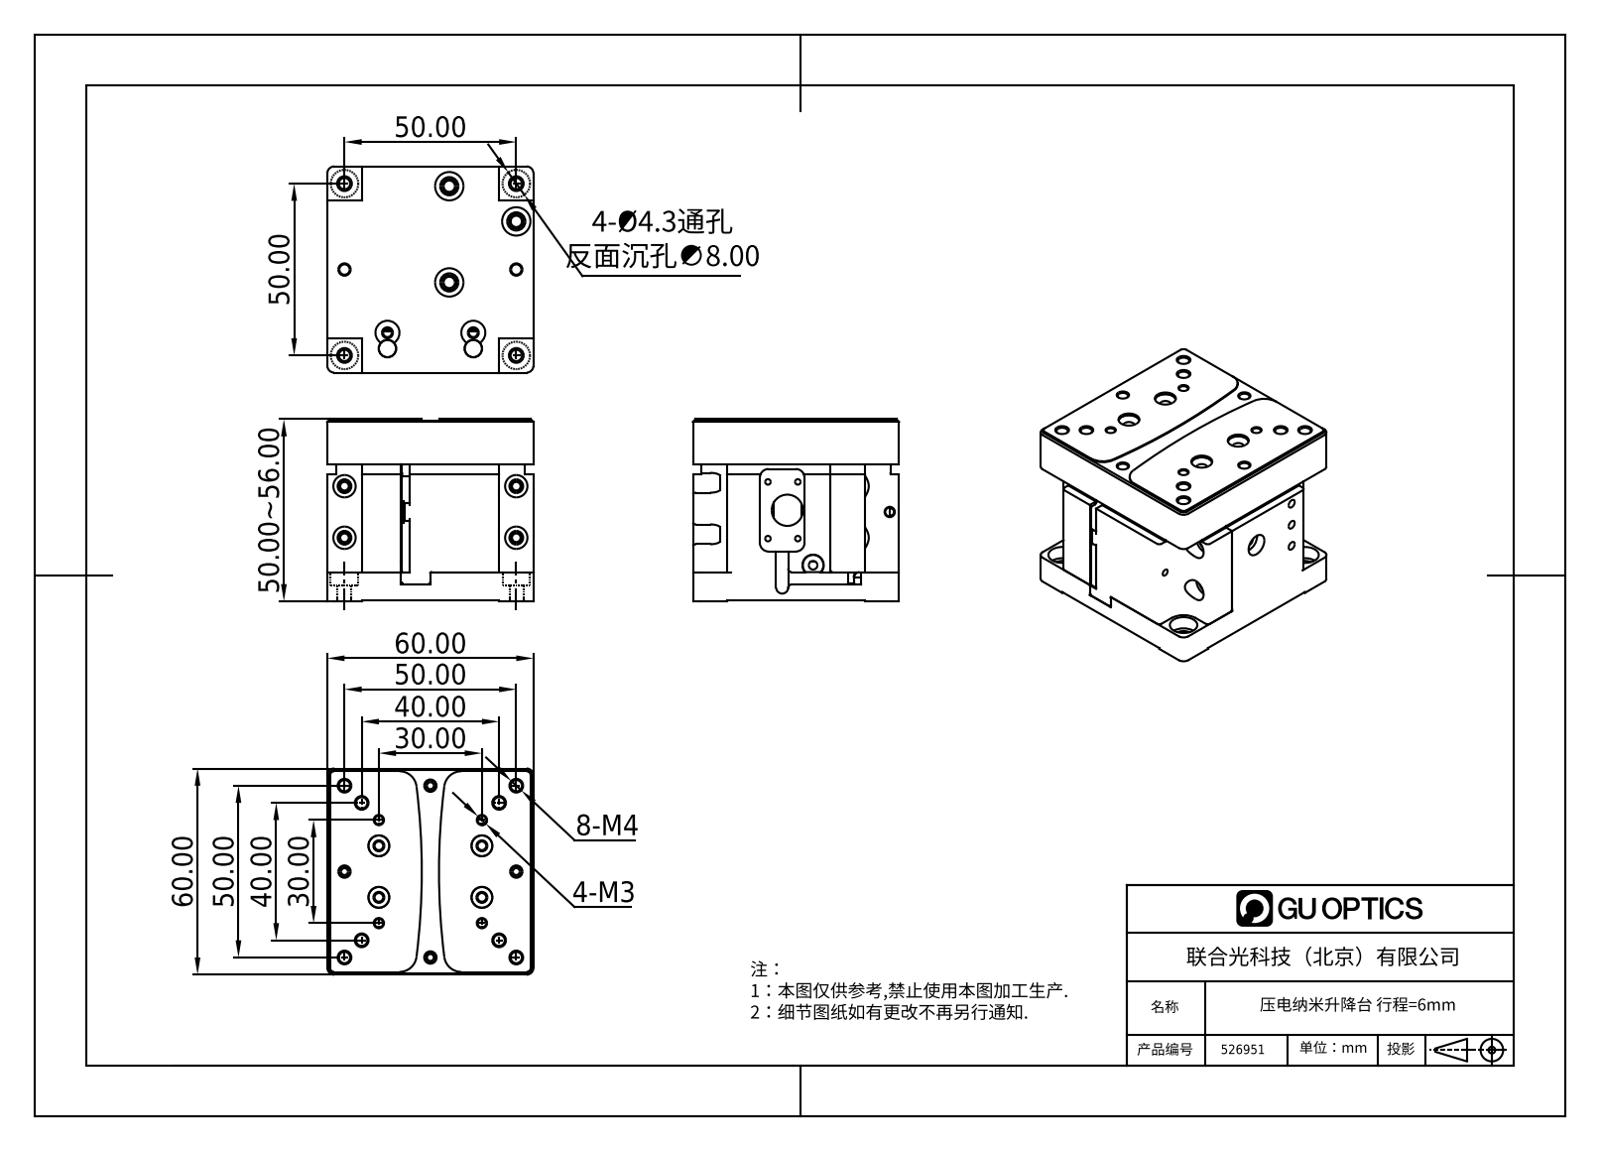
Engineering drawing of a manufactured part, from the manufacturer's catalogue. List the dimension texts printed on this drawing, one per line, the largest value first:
60.00
60.00
50.00
50.00
50.00~56.00
50.00
50.00
40.00
40.00
30.00
30.00
4-Ø4.3通孔 反面沉孔∅8.00
8-M4
4-M3
